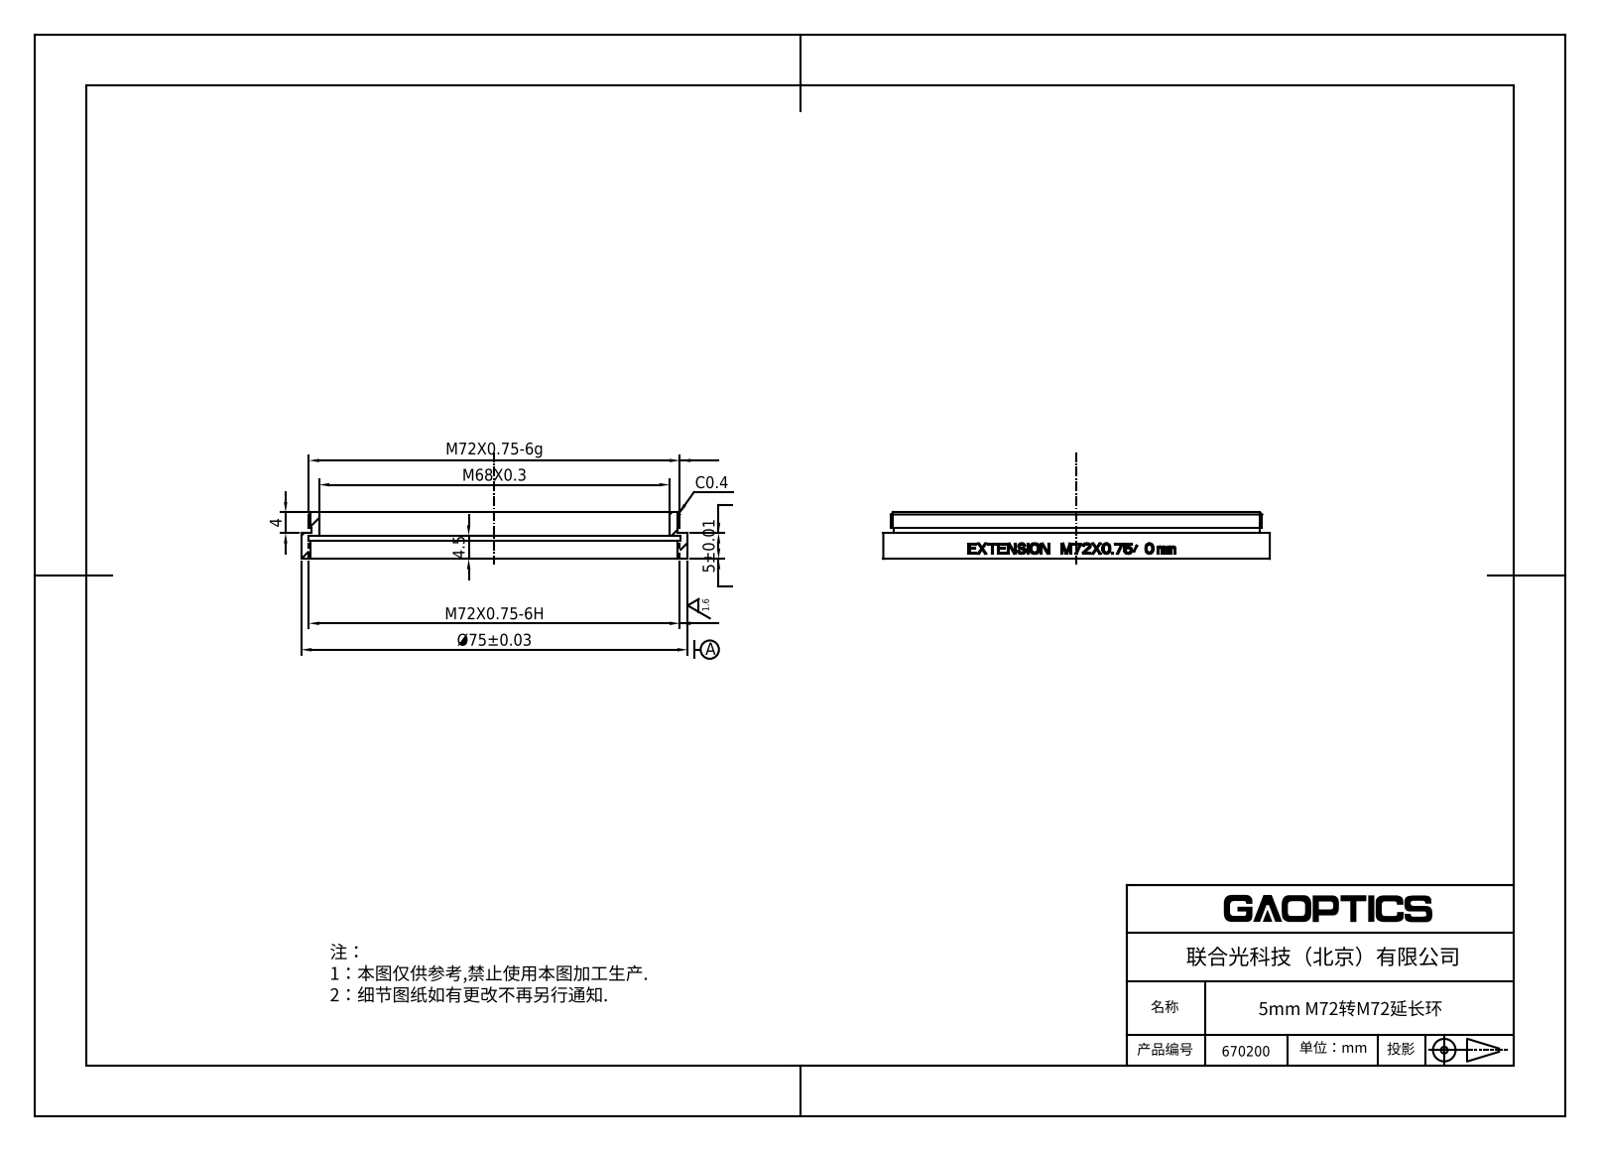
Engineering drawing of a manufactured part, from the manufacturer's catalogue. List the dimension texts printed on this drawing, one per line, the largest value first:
Ø75±0.03
M72X0.75-6H
M72X0.75-6g
M68X0.3
5±0.01
4.5
4
